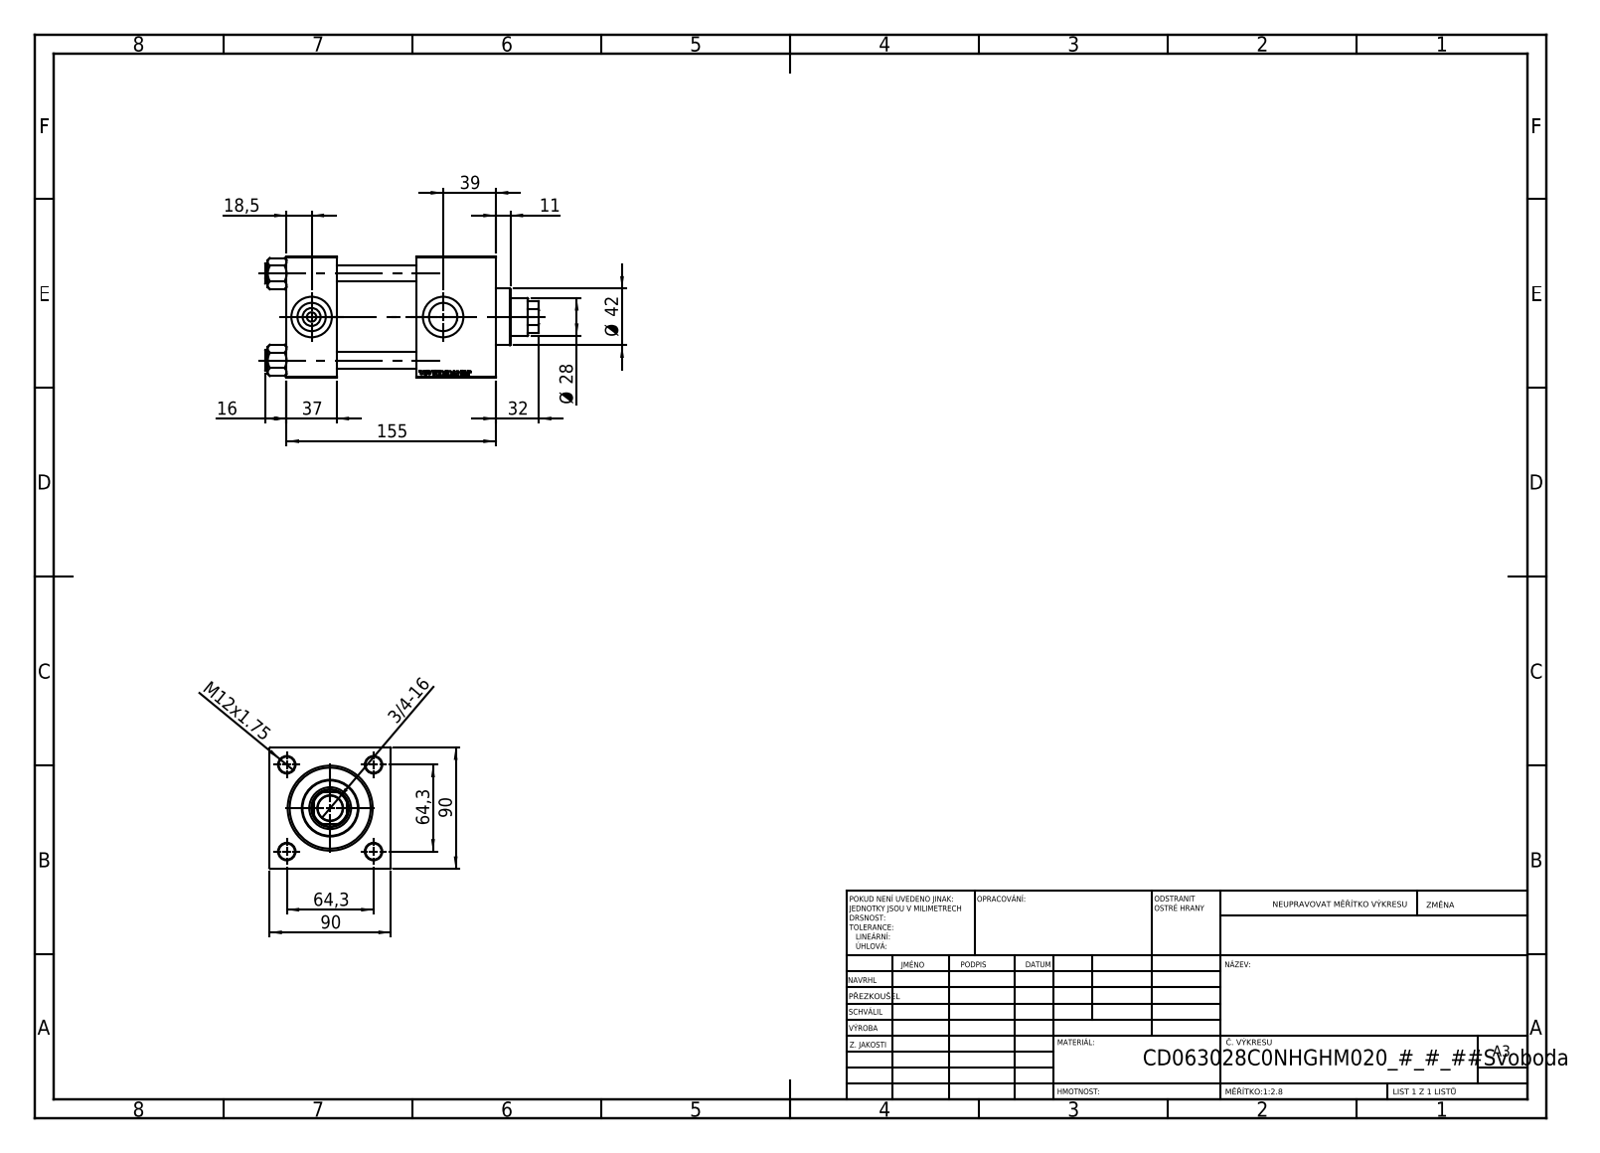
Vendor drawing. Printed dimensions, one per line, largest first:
155
90
90
64,3
64,3
Ø 42
39
37
32
Ø 28
18,5
16
M12x1.75
11
3/4-16
